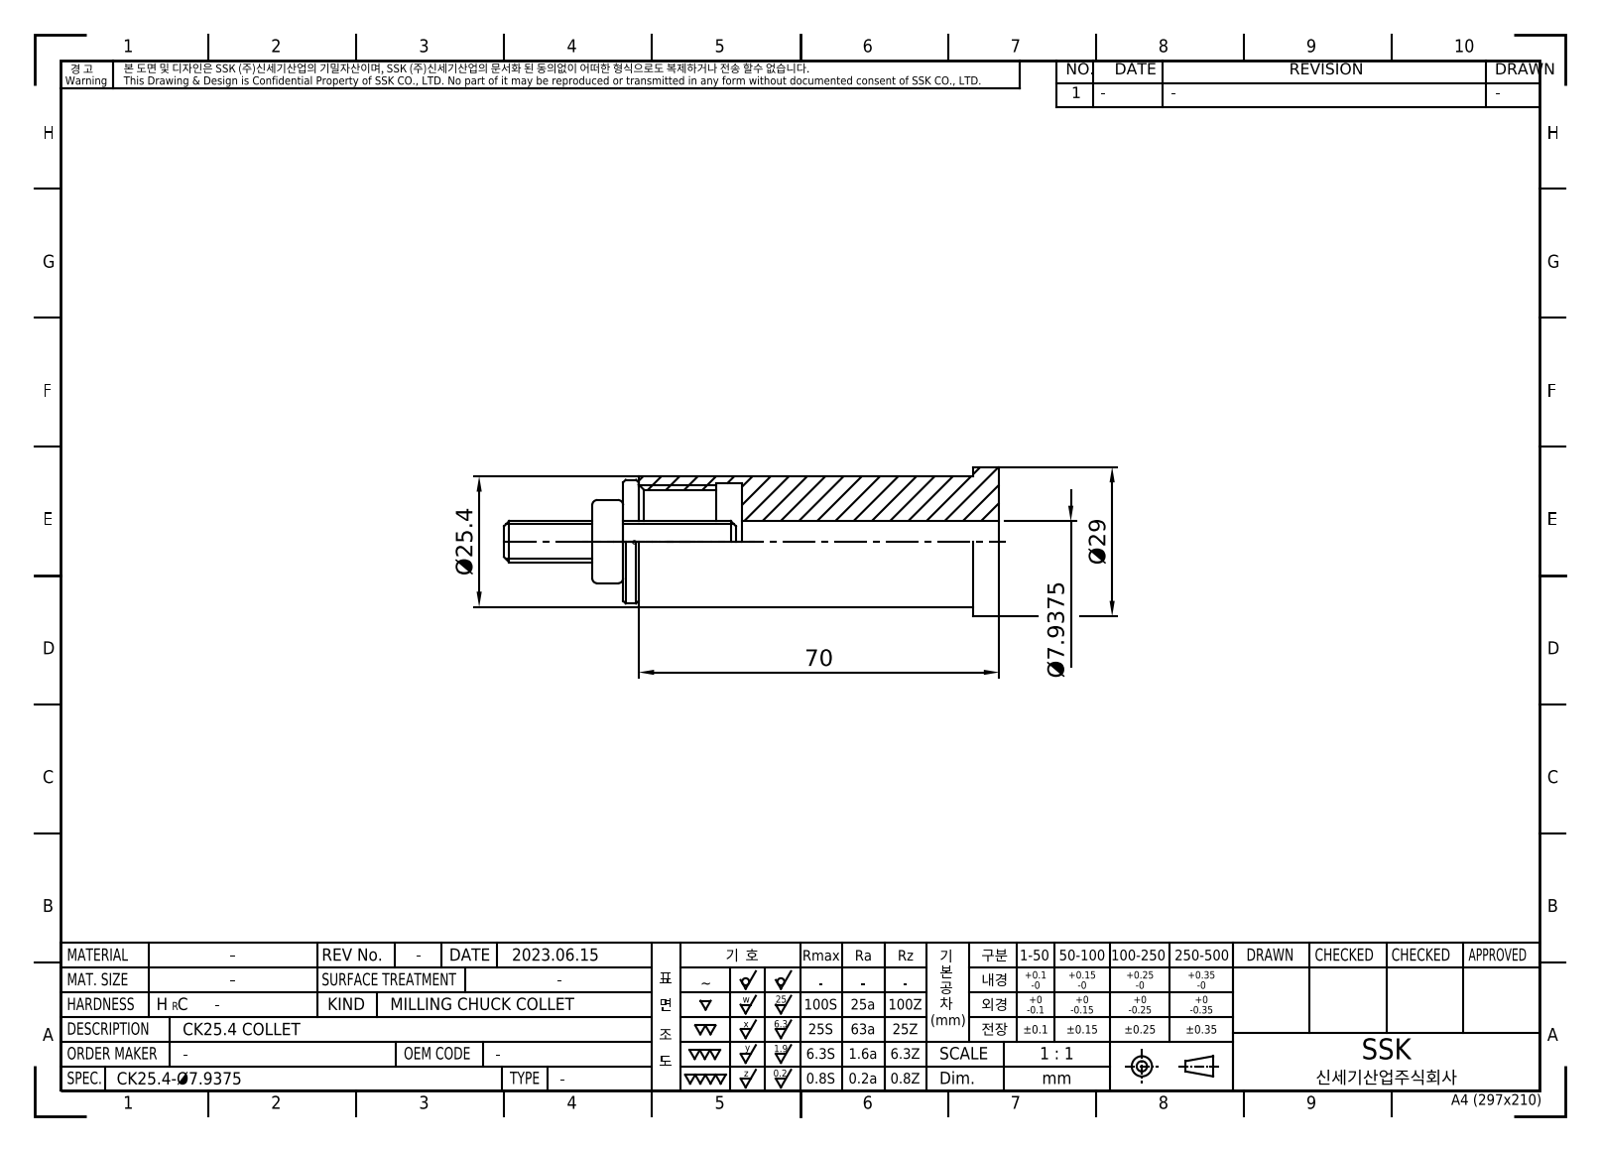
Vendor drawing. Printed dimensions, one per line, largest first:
70
Ø29
Ø25.4
Ø7.9375
